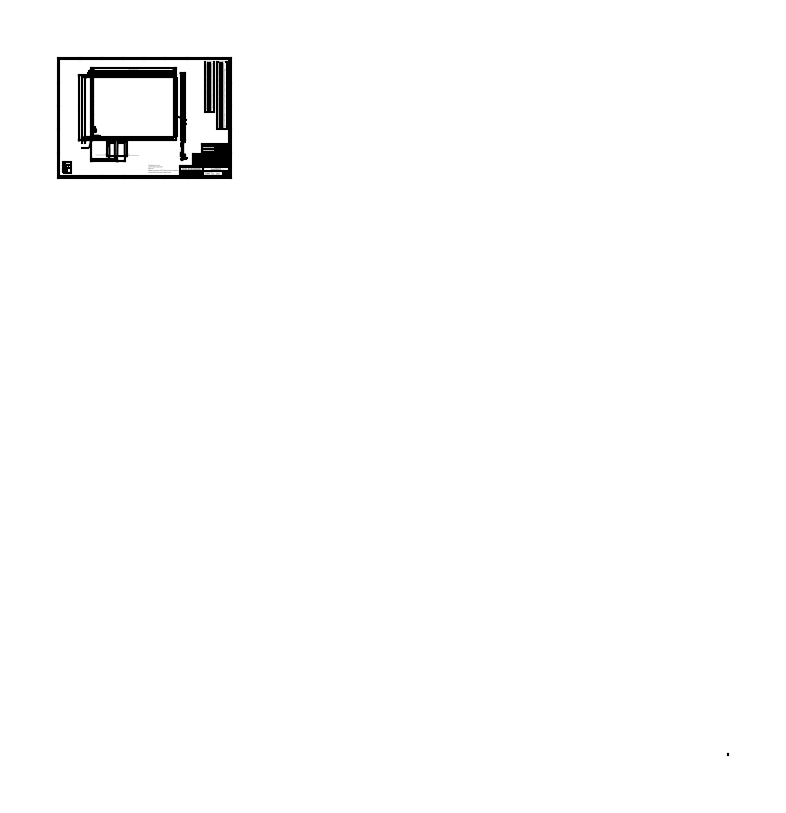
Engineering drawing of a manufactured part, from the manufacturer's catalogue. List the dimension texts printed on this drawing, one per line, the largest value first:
320±0.5(Touch panel)
307.4 (Viewing area)
304.2 (Active area)
246.7±0.5(Touch panel)
231.3 (Viewing area)
228.1 (Active area)
(99.14)
(69.14)
60±1
60±1
28±0.1
20.5±0.1
11.26
(10)
9.66
8.22
6.6
6.47
6.33
5
2.35±0.2
0.5
0.3±0.03
0.3±0.03
0.3
